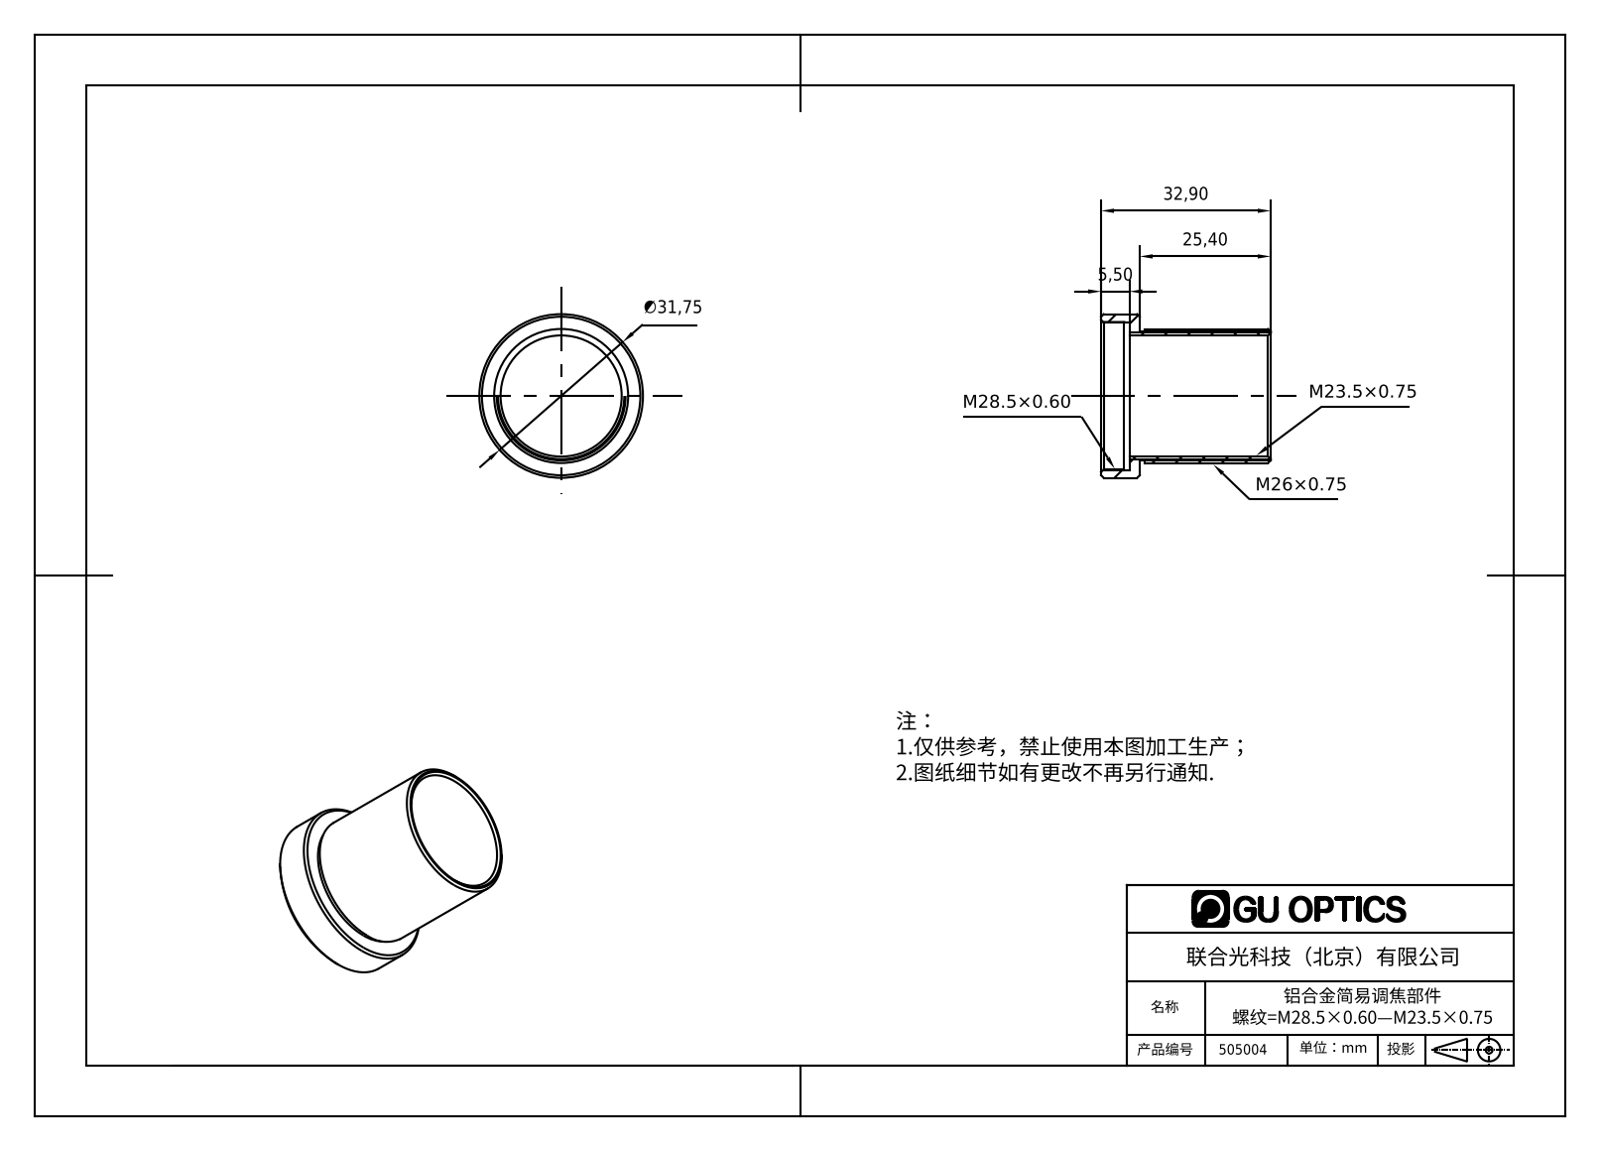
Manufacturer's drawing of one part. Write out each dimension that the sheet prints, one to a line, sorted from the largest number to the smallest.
32,90
∅31,75
25,40
5,50
